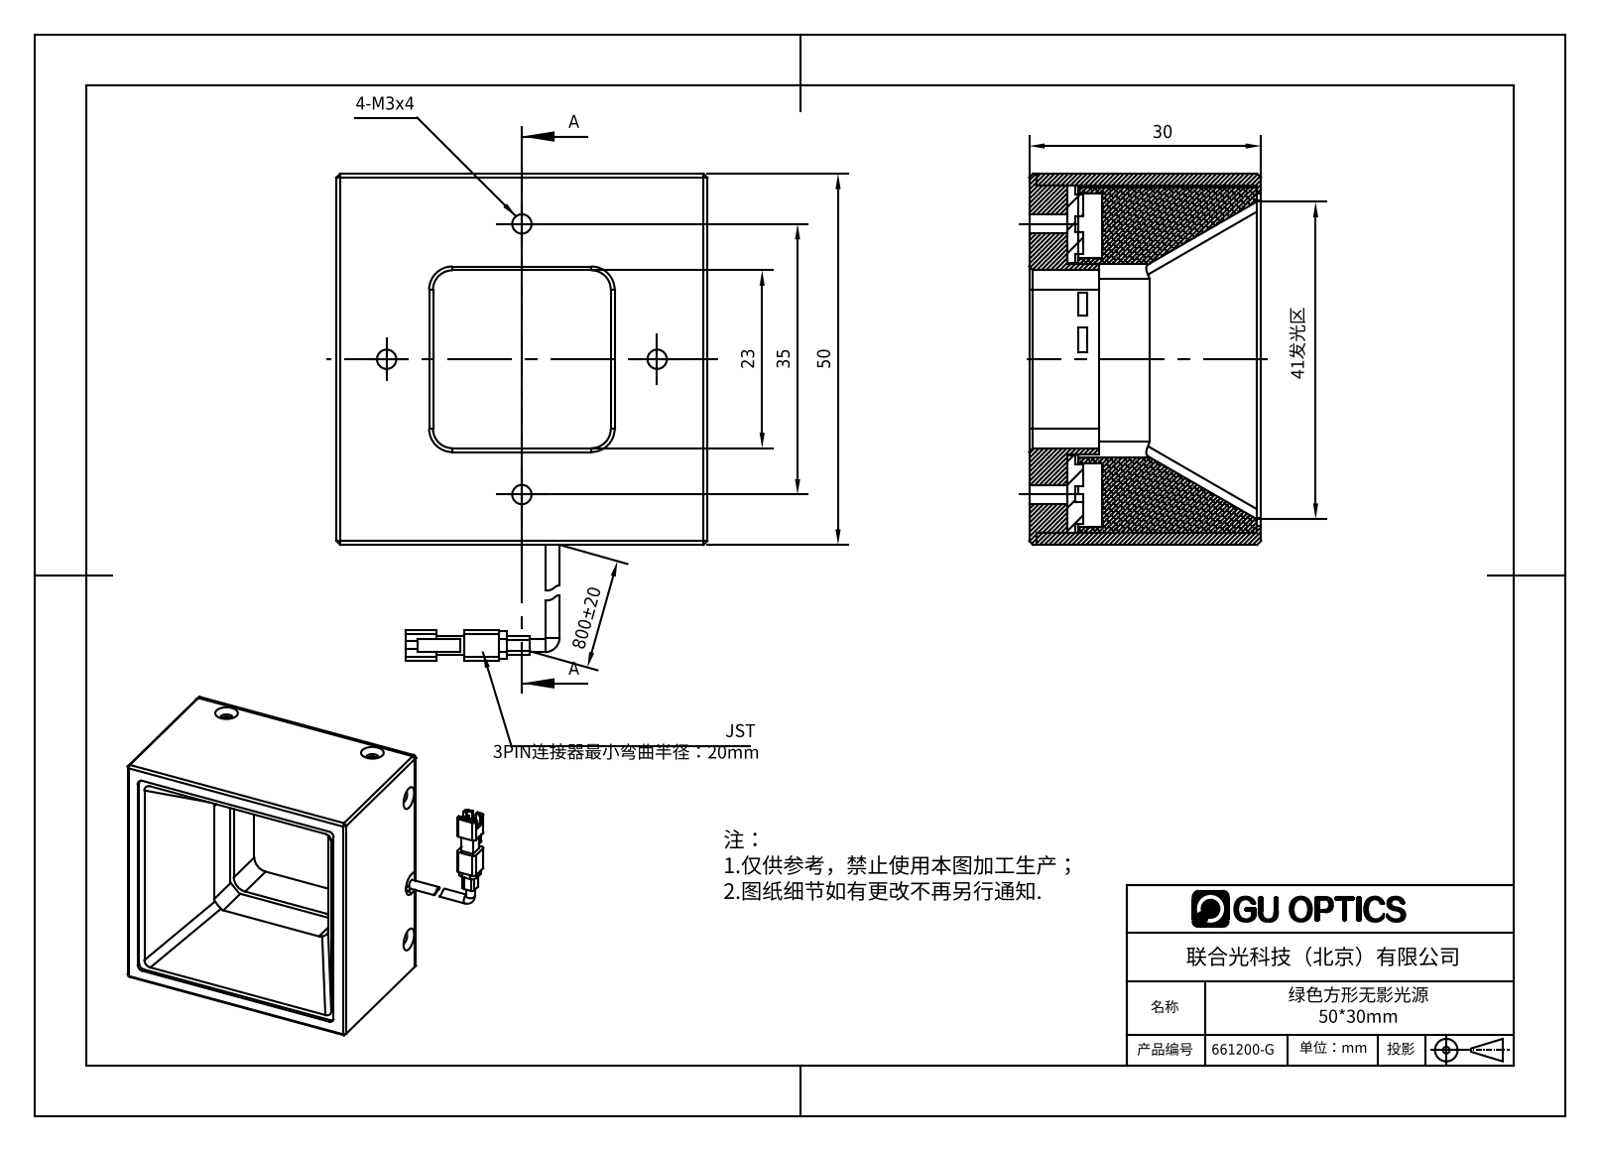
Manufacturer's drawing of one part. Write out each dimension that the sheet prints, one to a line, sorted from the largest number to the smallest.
800±20
50
41发光区
35
30
23
